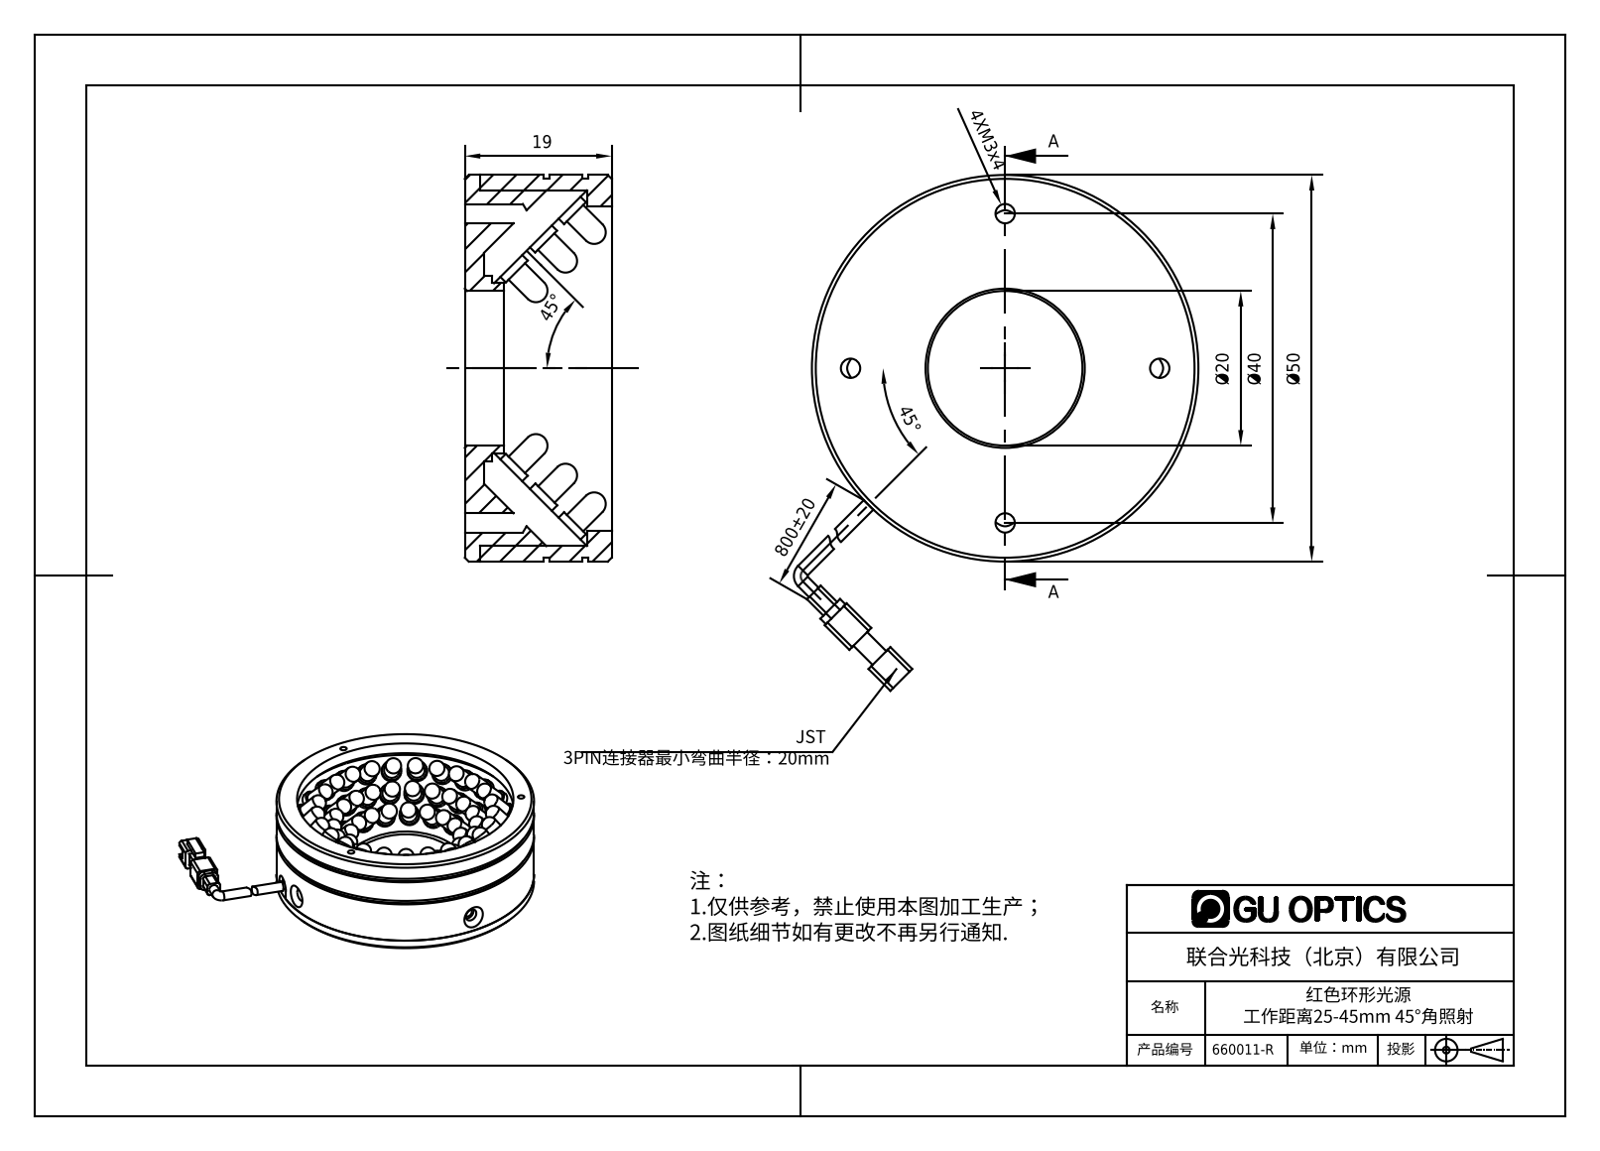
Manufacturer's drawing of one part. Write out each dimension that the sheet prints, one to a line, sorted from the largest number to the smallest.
800±20
Ø50
45°
45°
Ø40
Ø20
19
4XM3x4
